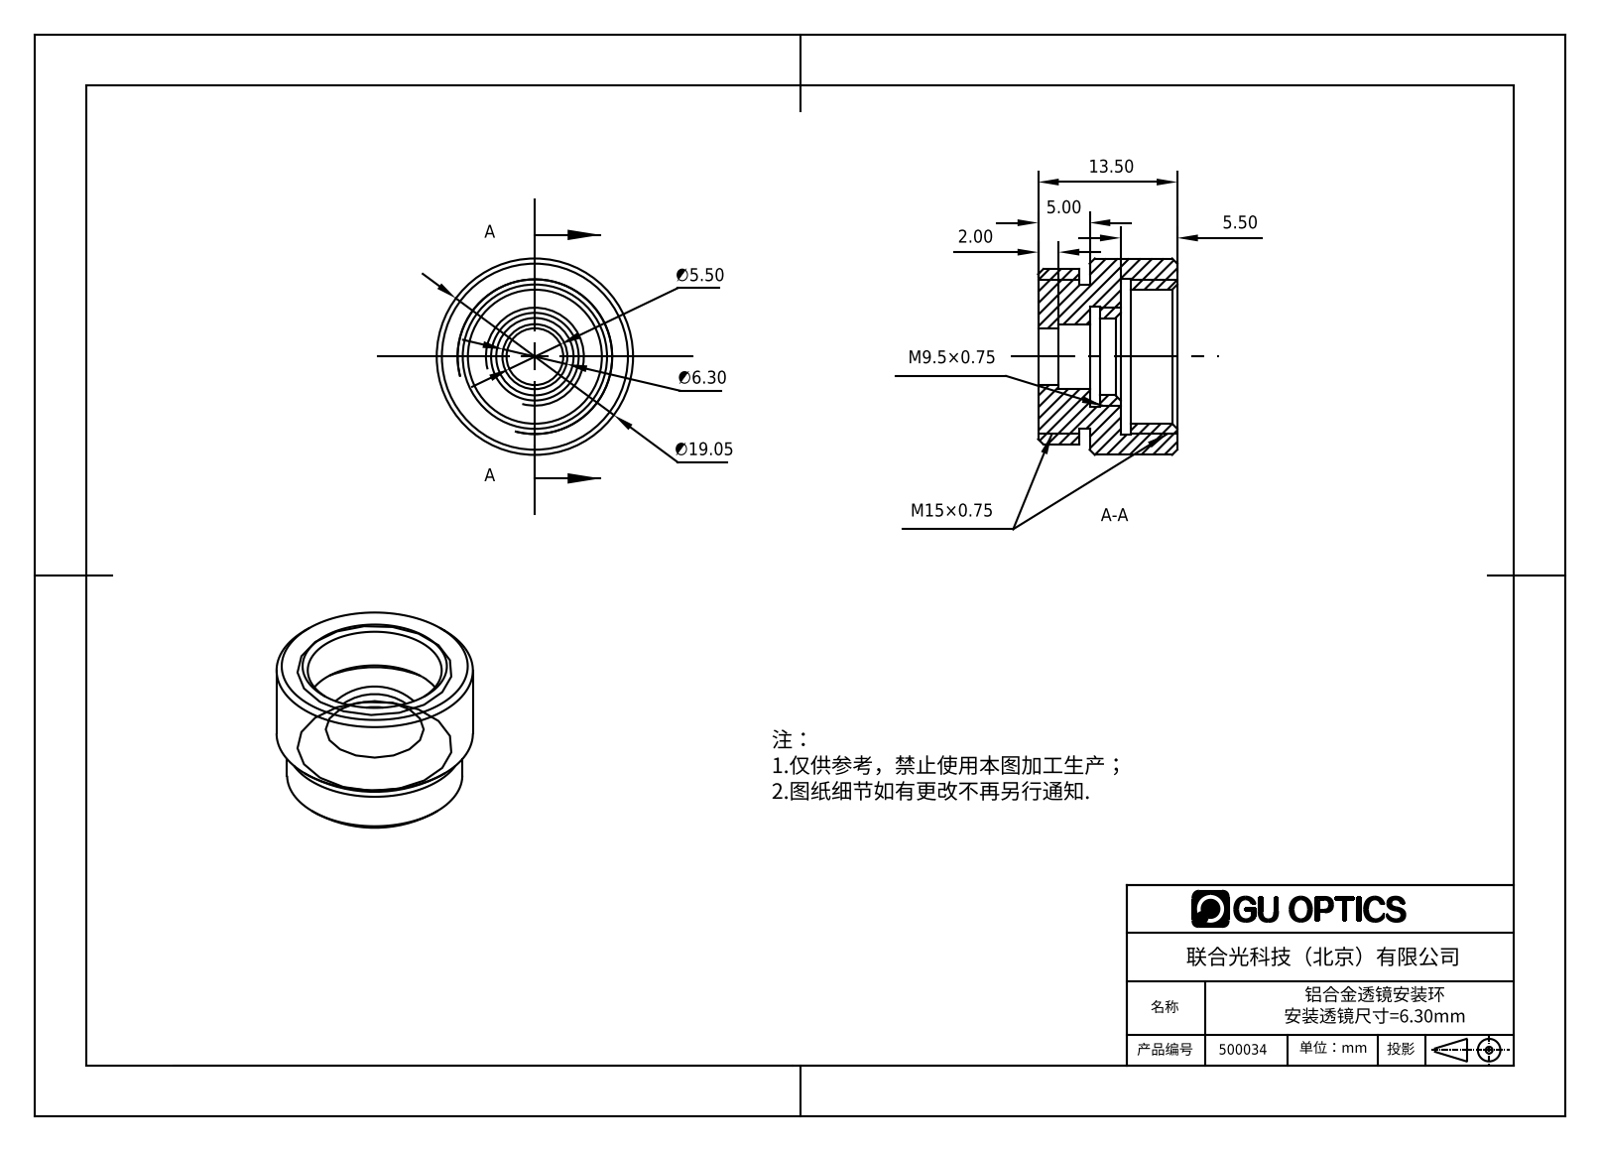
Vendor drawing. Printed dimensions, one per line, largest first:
∅19.05
13.50
∅6.30
∅5.50
5.50
5.00
2.00
